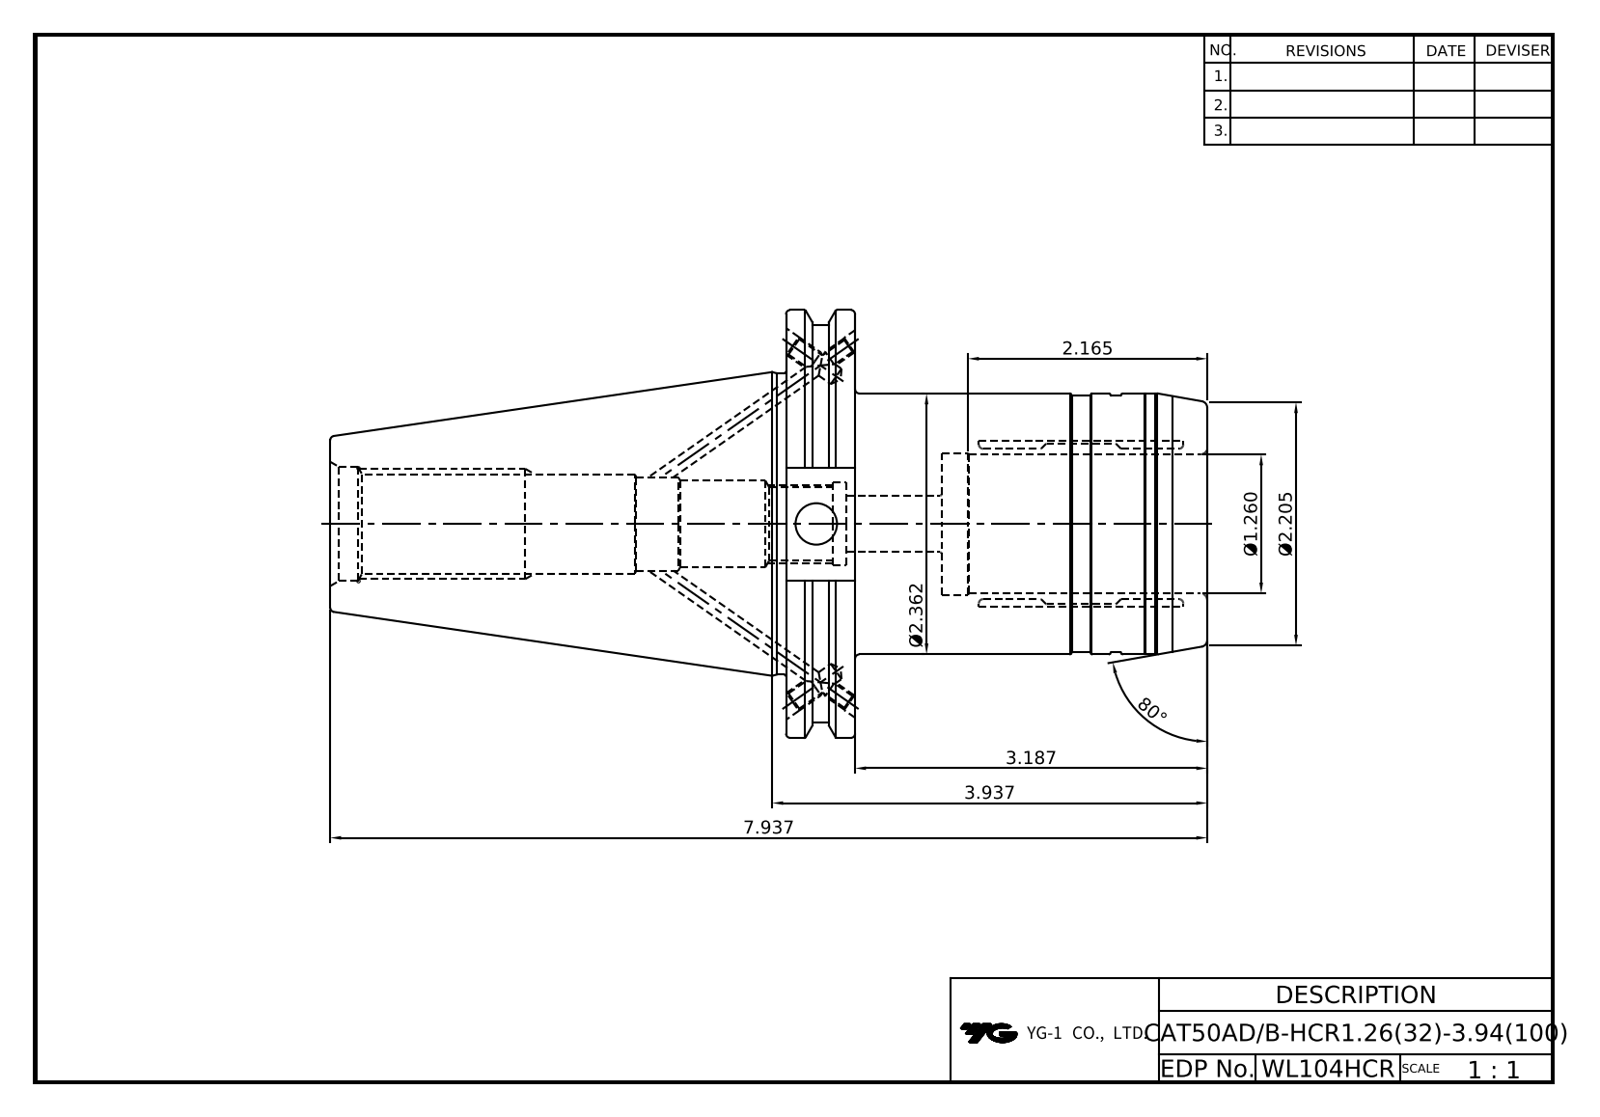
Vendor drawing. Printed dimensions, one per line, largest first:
80°
7.937
3.937
3.187
Ø2.362
Ø2.205
2.165
Ø1.260
